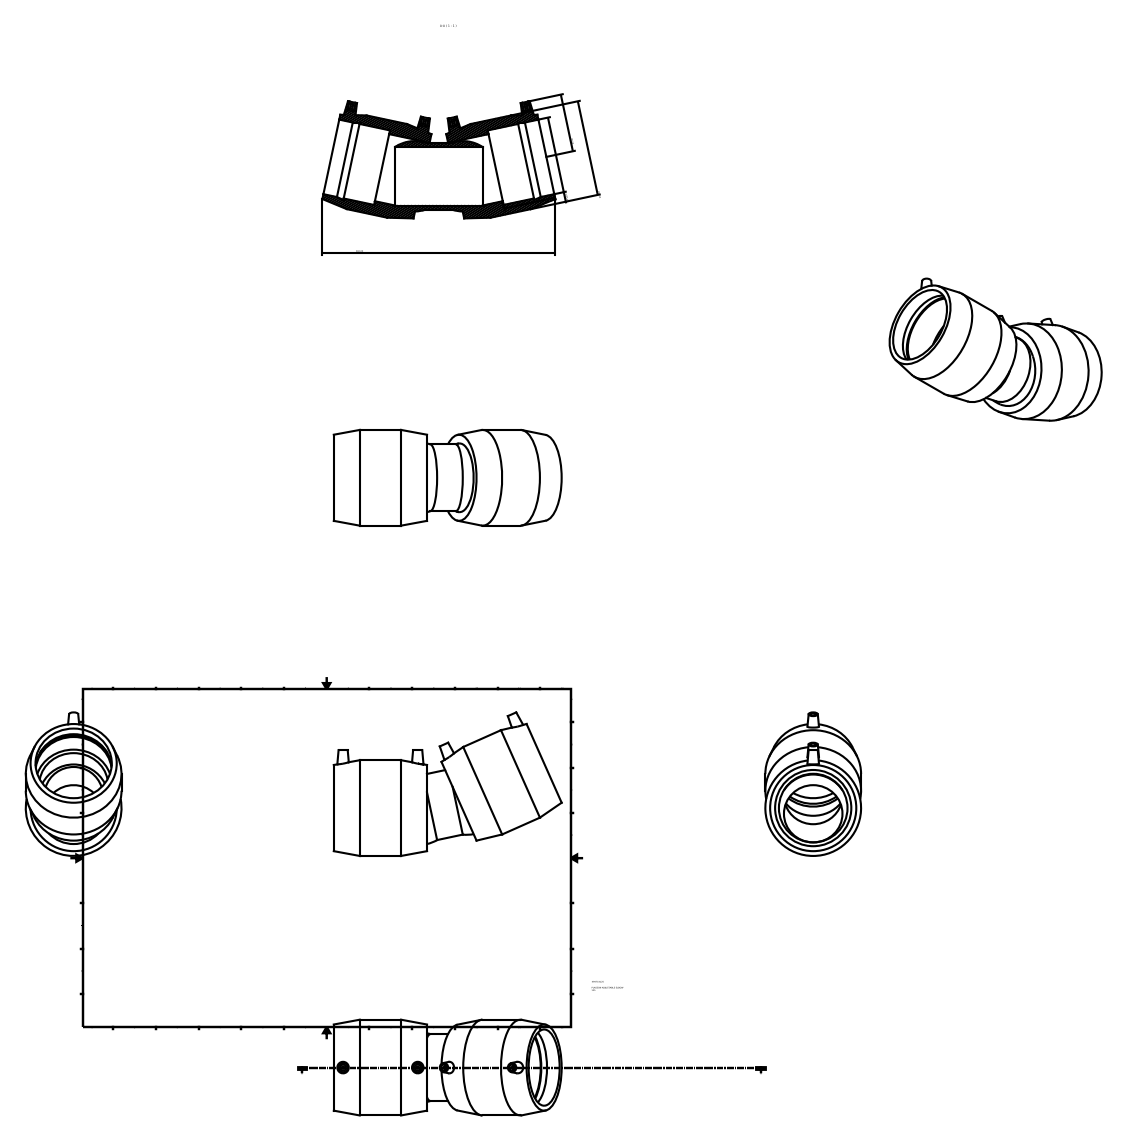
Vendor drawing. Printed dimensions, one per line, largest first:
382,00
157,00
n125,00
95,00
85,00
